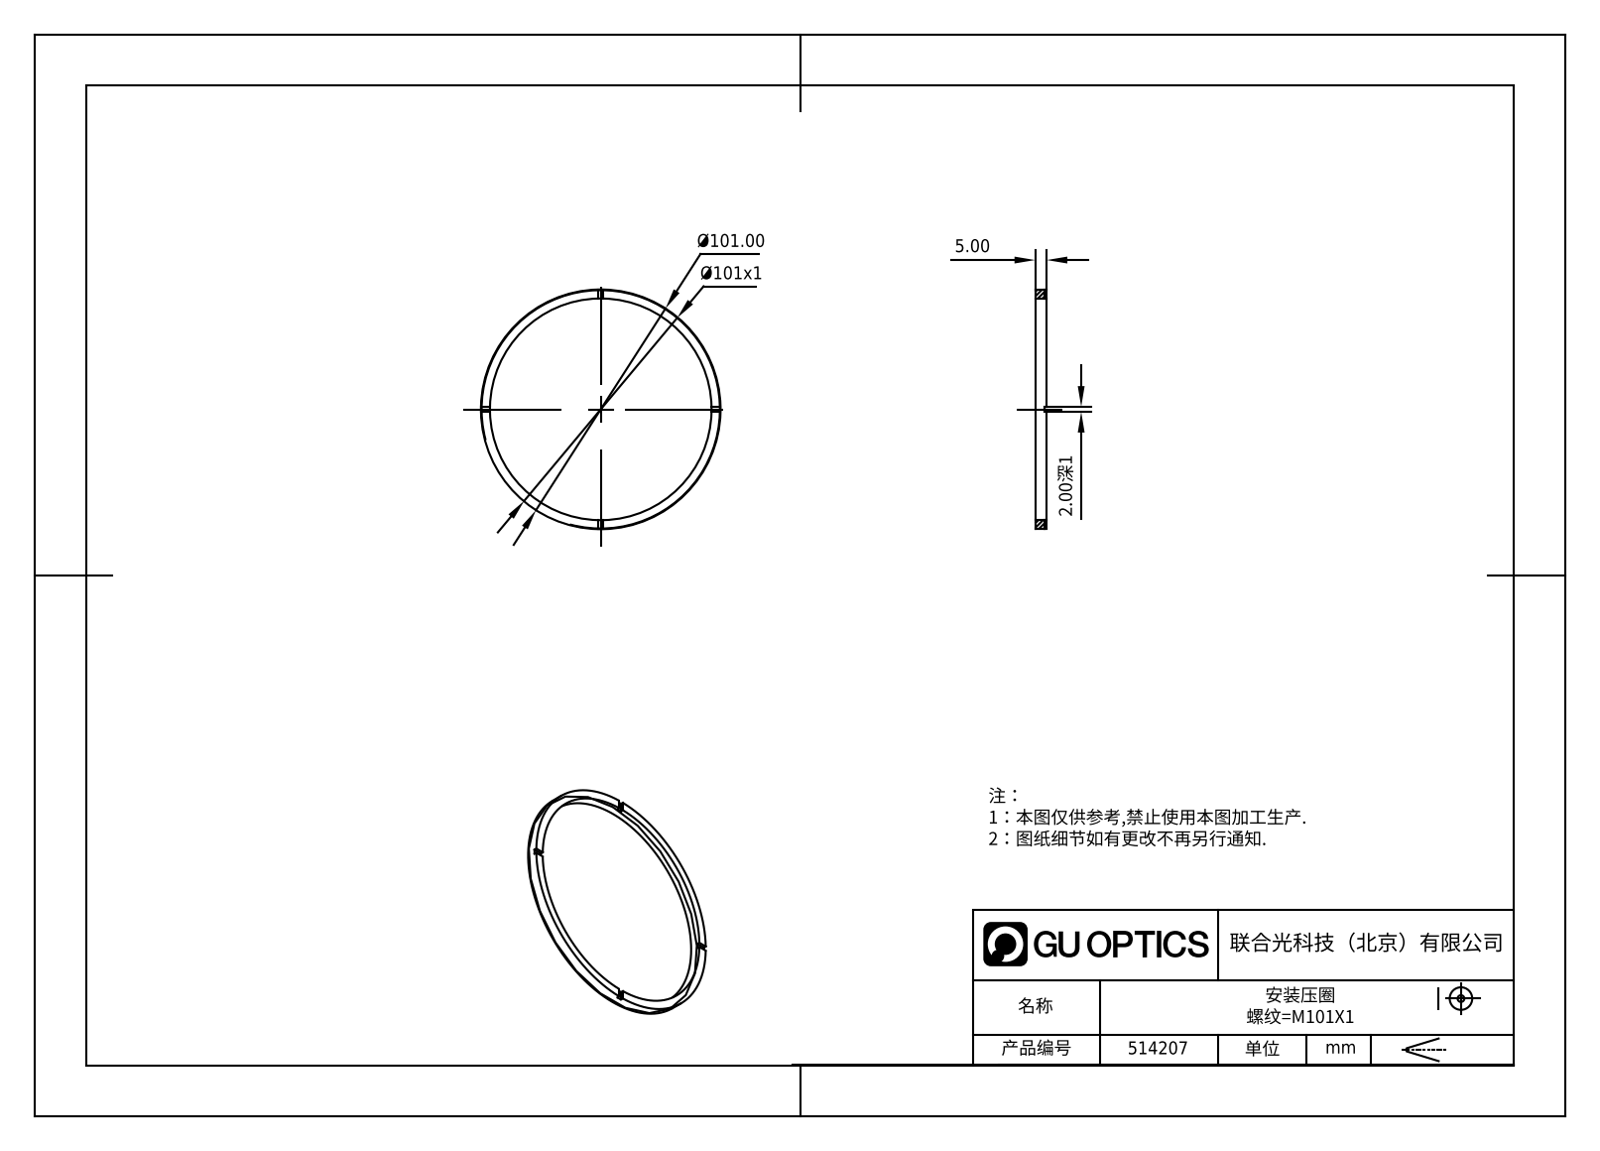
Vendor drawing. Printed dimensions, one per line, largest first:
Ø101.00
Ø101x1
5.00
2.00深1
